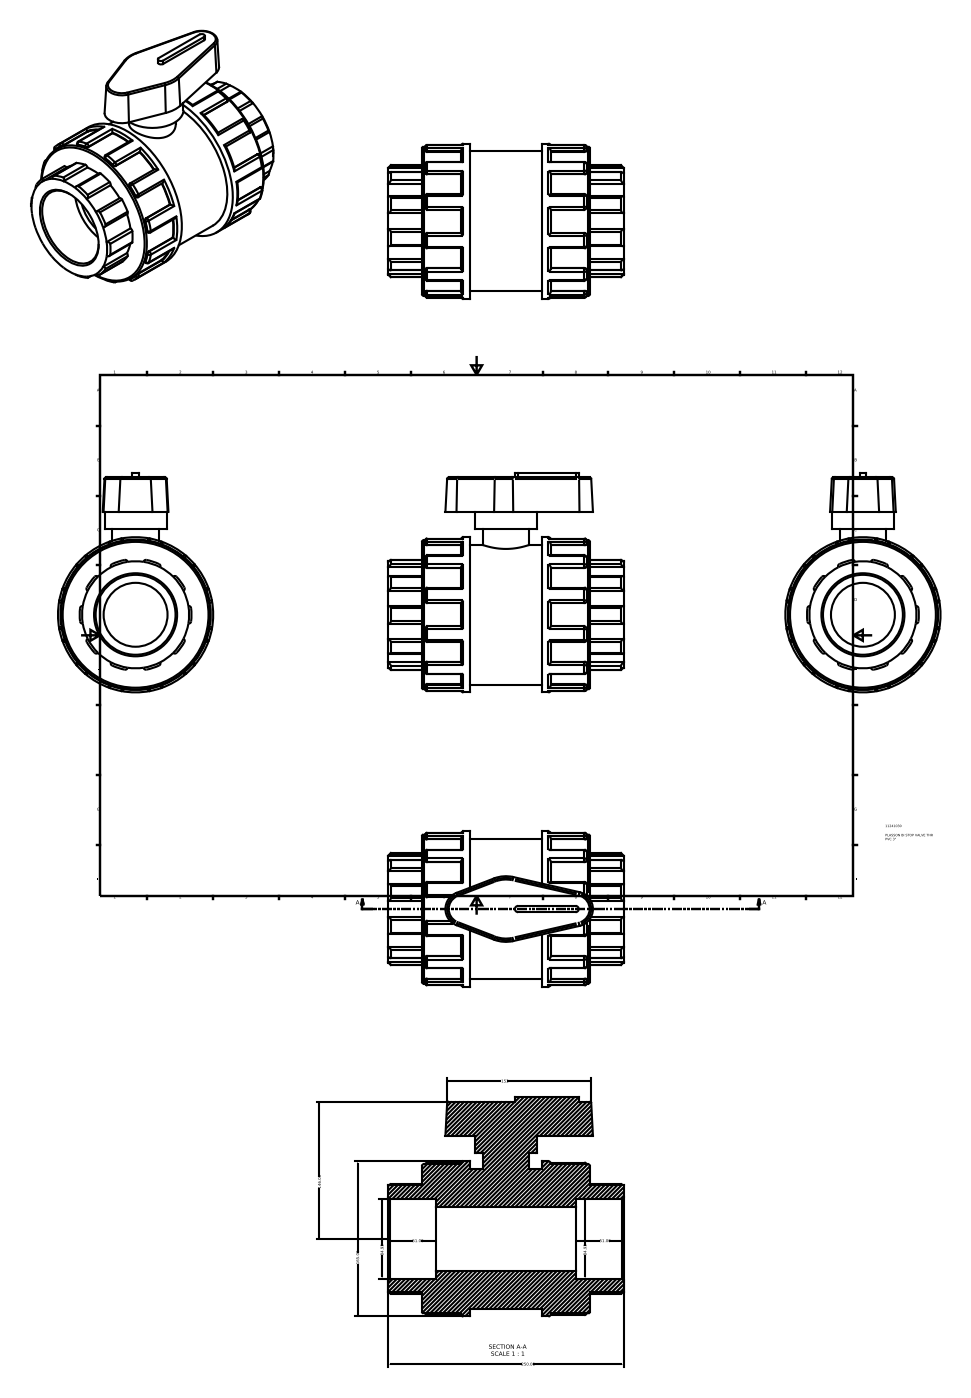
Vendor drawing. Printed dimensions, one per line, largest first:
250.00
165.00
153
146.00
84.93
84.93
51.00
51.00
